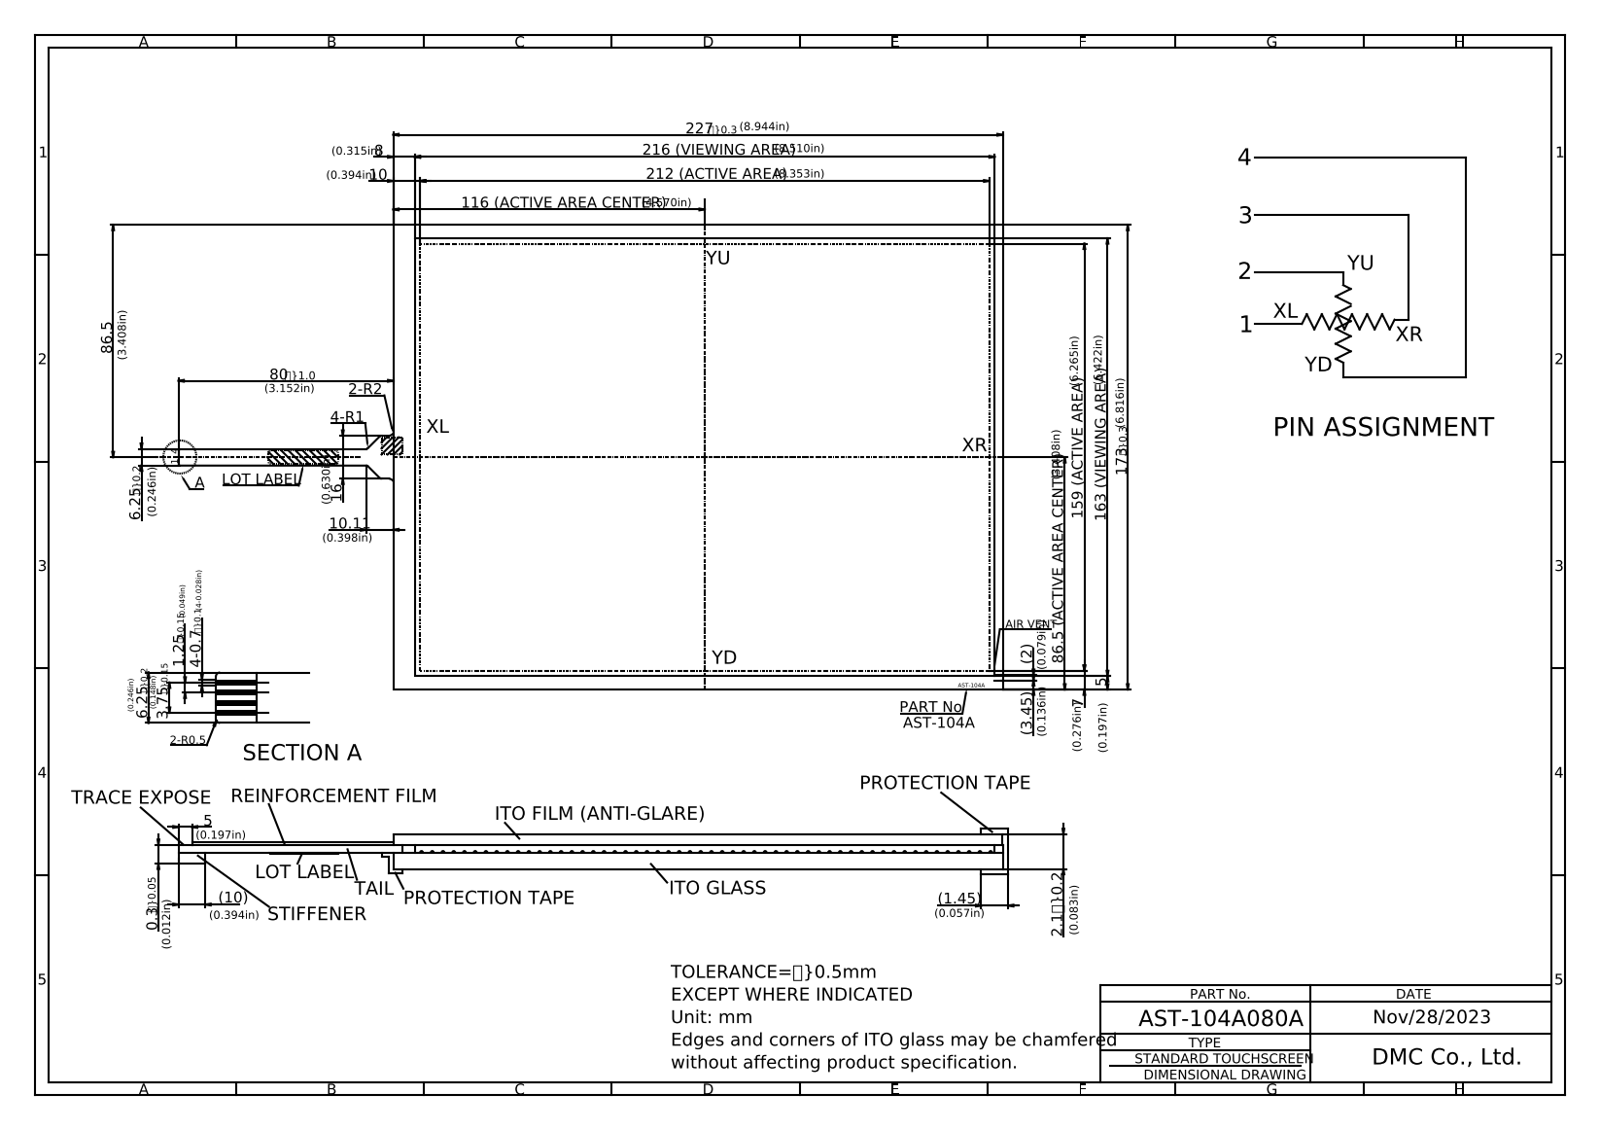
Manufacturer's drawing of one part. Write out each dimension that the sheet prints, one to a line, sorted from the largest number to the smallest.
227.00
216 (VIEWING AREA)
212 (ACTIVE AREA)
173.00
163 (VIEWING AREA)
159 (ACTIVE AREA)
116 (ACTIVE AREA CENTER)
86.5
86.5 (ACTIVE AREA CENTER)
80{\H0.75x;?}1.0}
16
10.11
10
(10)
8
7
6.25{\H0.6x;?}0.2}
6.25
5
5
4-0.7{\H0.6x;?}0.1}
3.75{\H0.6x;?}0.15}
(3.45)
2.1?}0.2
(2)
(1.45)
1.25{\H0.6x;?}0.15}
0.3{\H0.7x;?}0.05}
